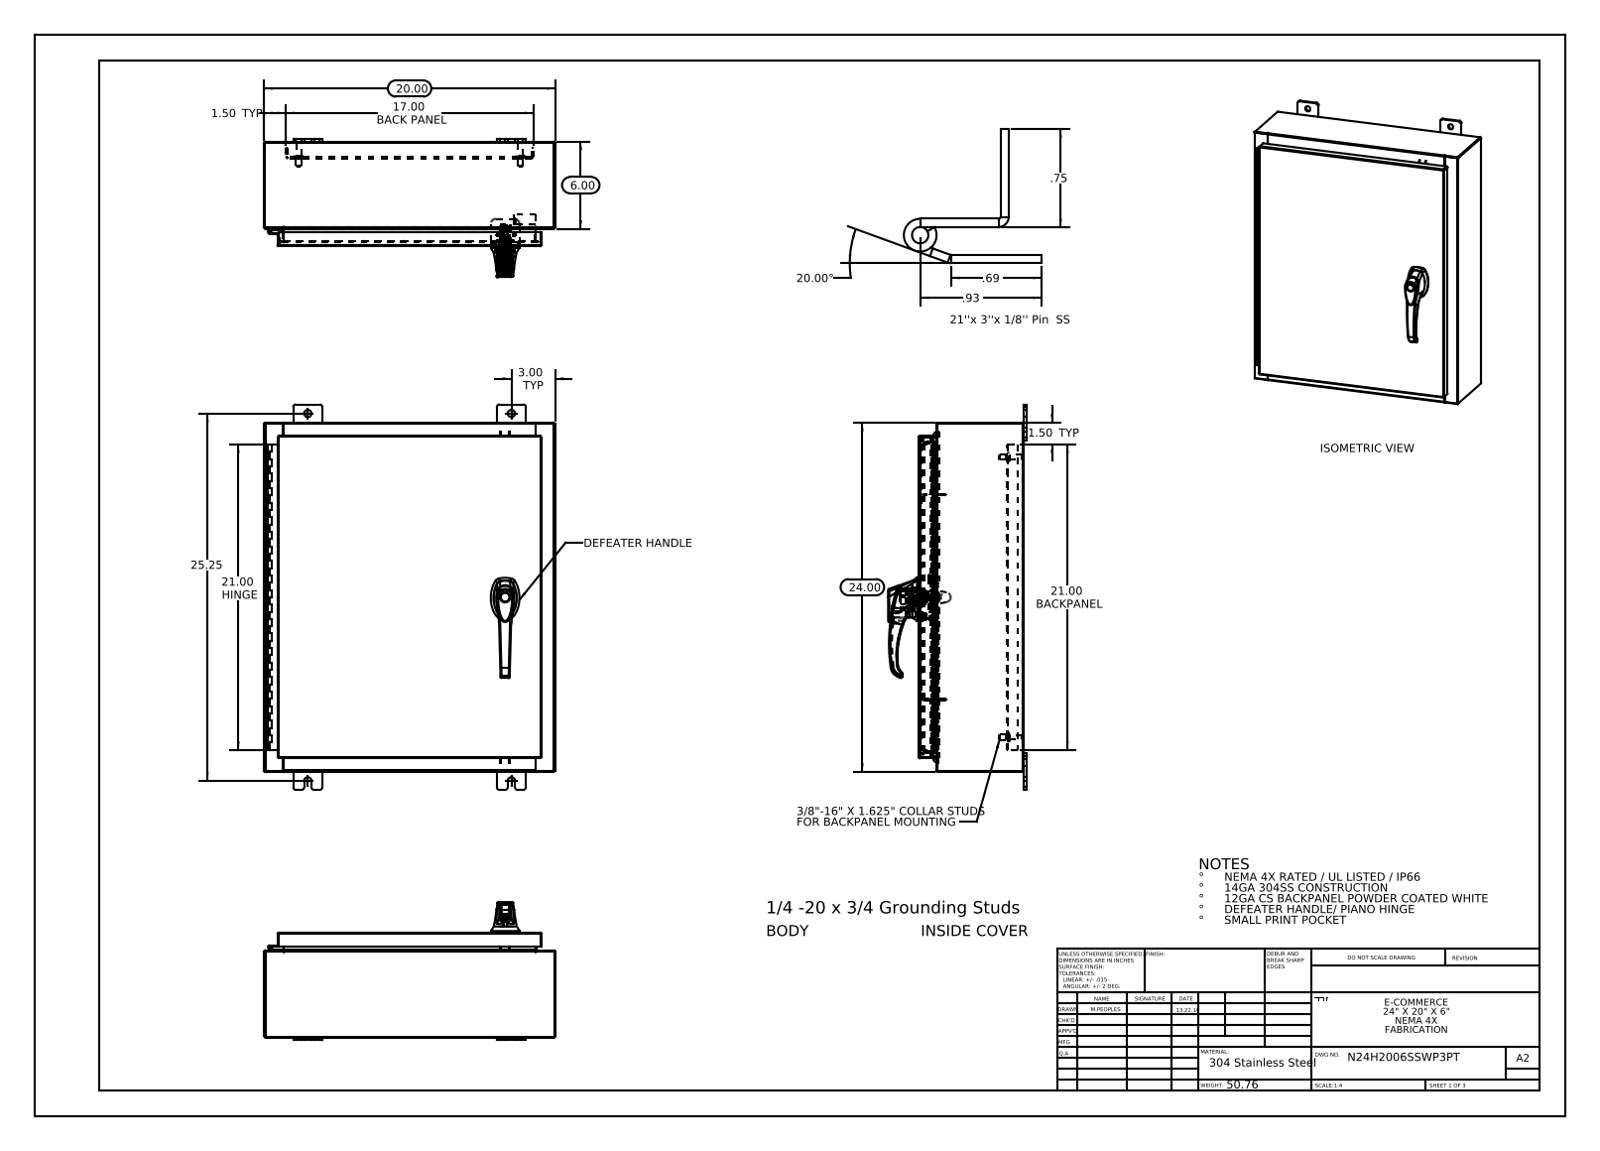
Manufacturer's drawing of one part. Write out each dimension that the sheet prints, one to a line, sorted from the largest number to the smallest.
25.25
24.00
21.00 HINGE
21.00 BACKPANEL
20.00
20.00°
17.00 BACK PANEL
6.00
3.00 TYP
1.50 TYP
1.50 TYP
.93
.75
.69
